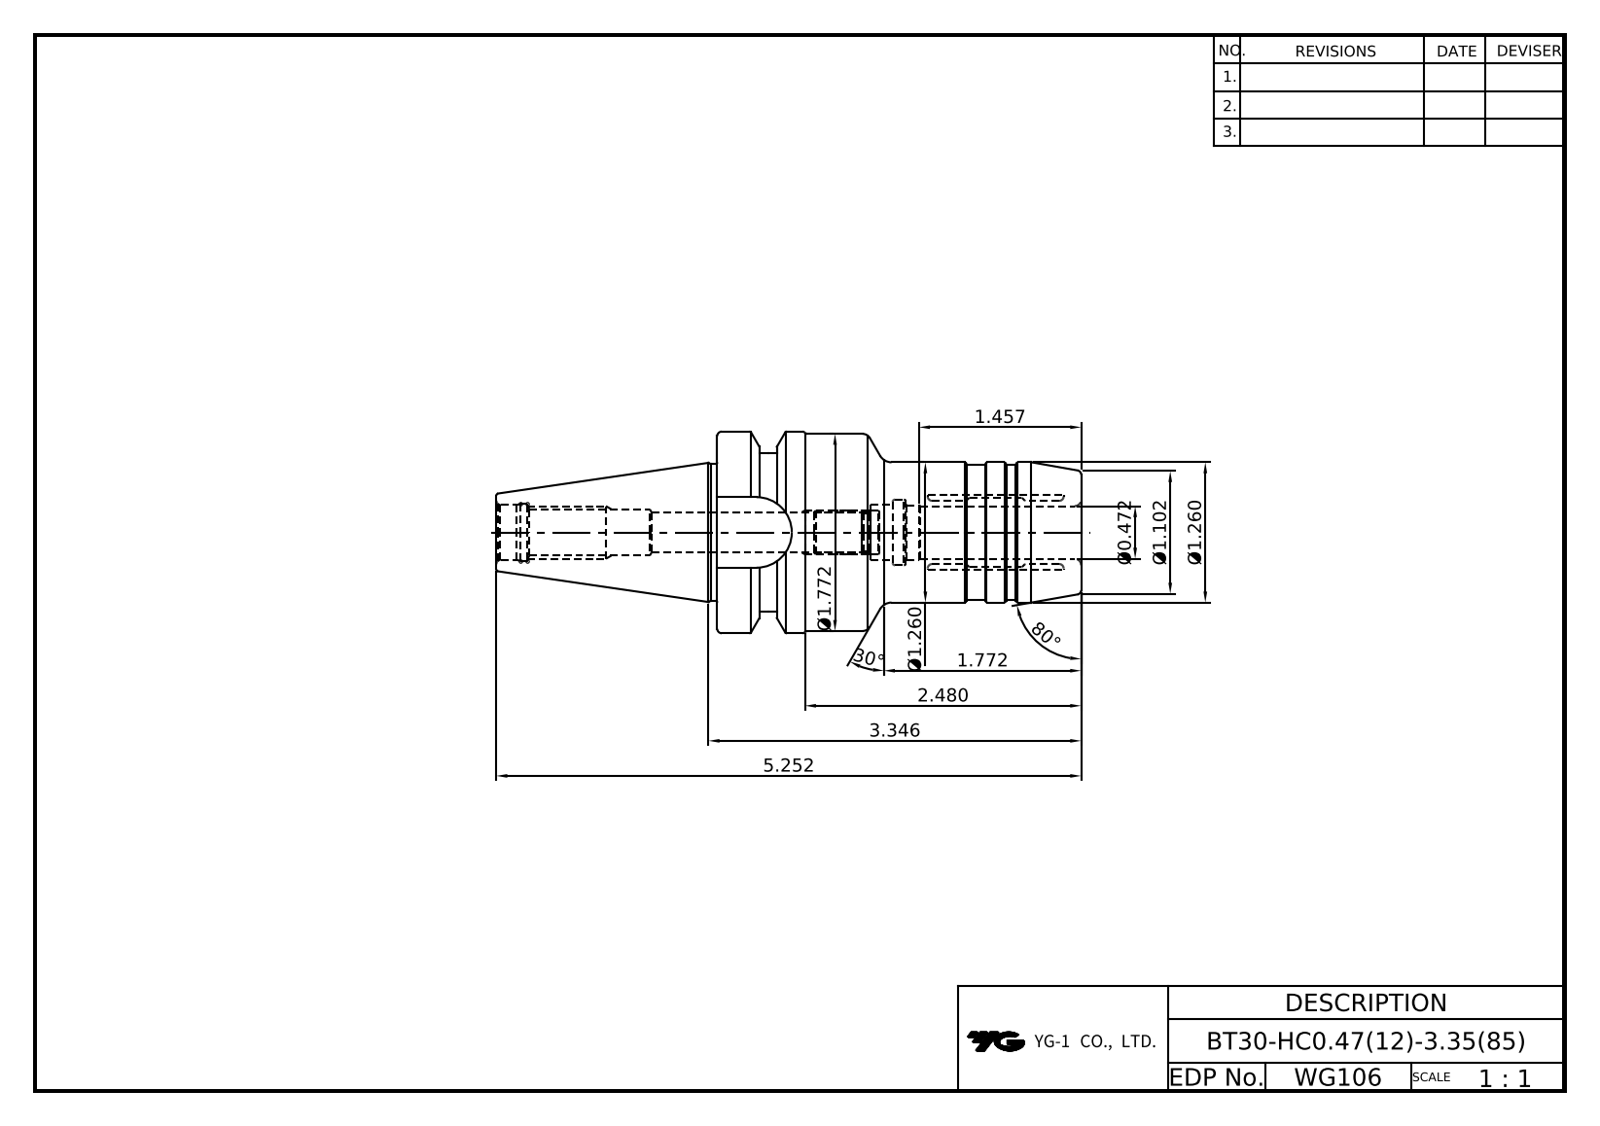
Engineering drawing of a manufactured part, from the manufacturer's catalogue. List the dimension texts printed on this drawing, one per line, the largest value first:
80°
30°
5.252
3.346
2.480
1.772
Ø1.772
1.457
Ø1.260
Ø1.260
Ø1.102
Ø0.472
